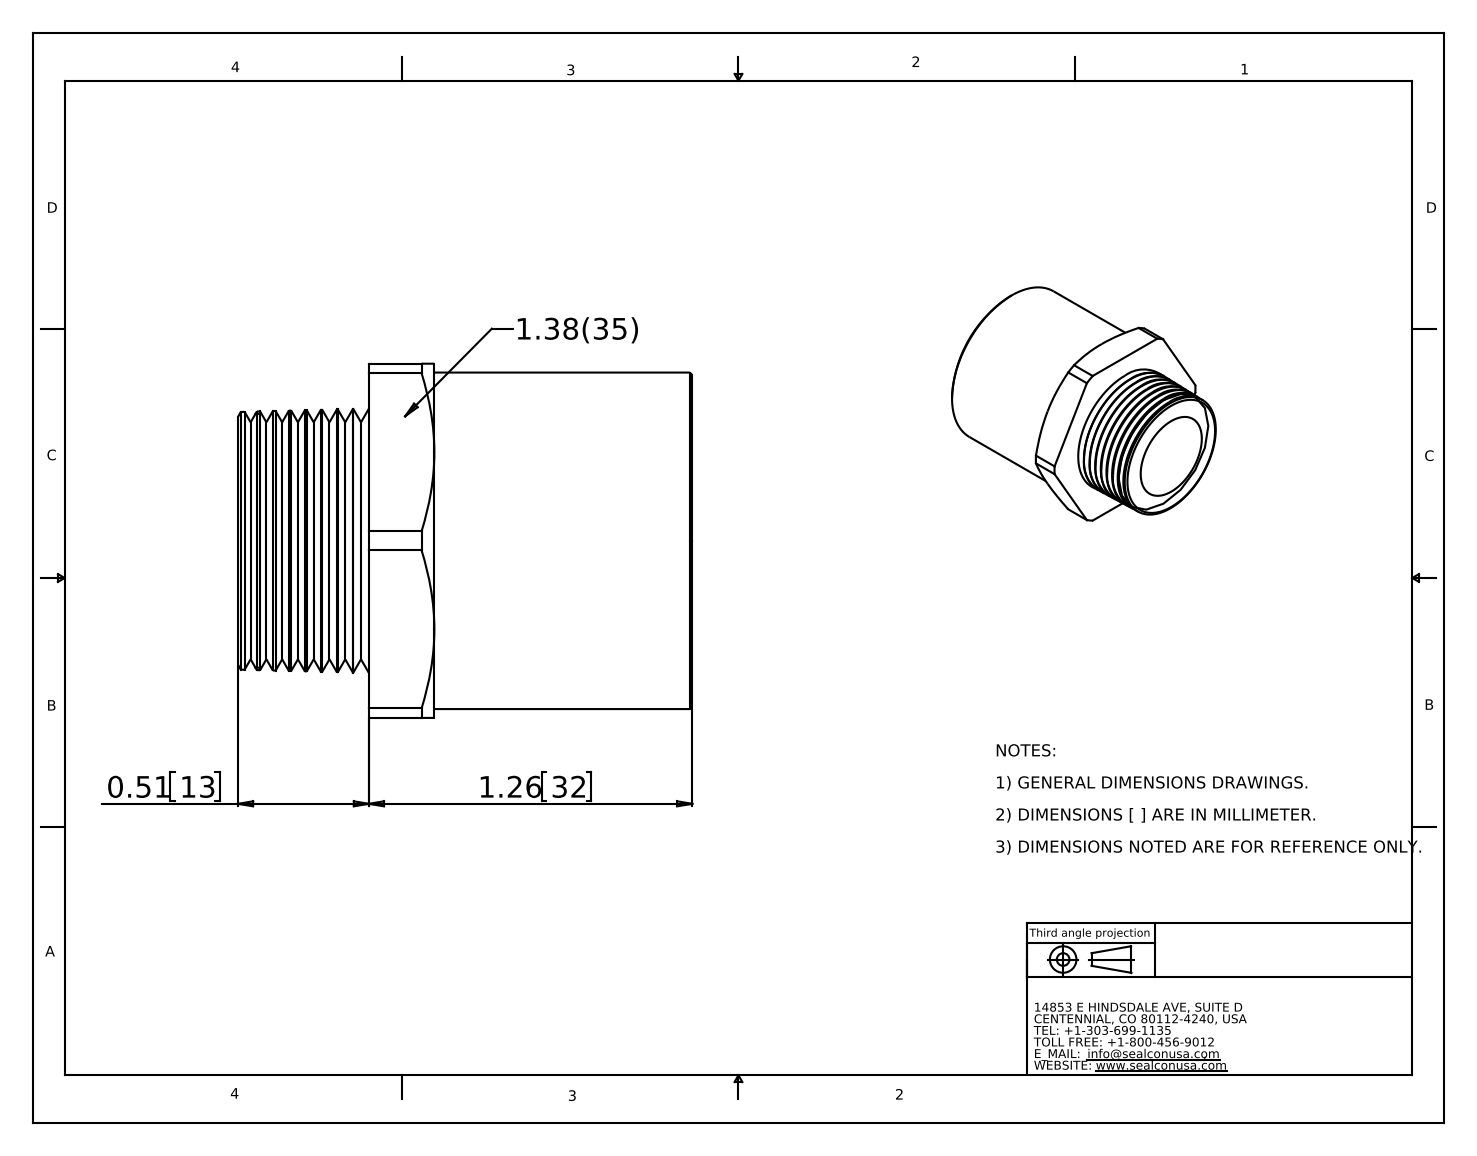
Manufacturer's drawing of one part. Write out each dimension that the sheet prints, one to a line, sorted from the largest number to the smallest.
1.26 32
0.51 13
